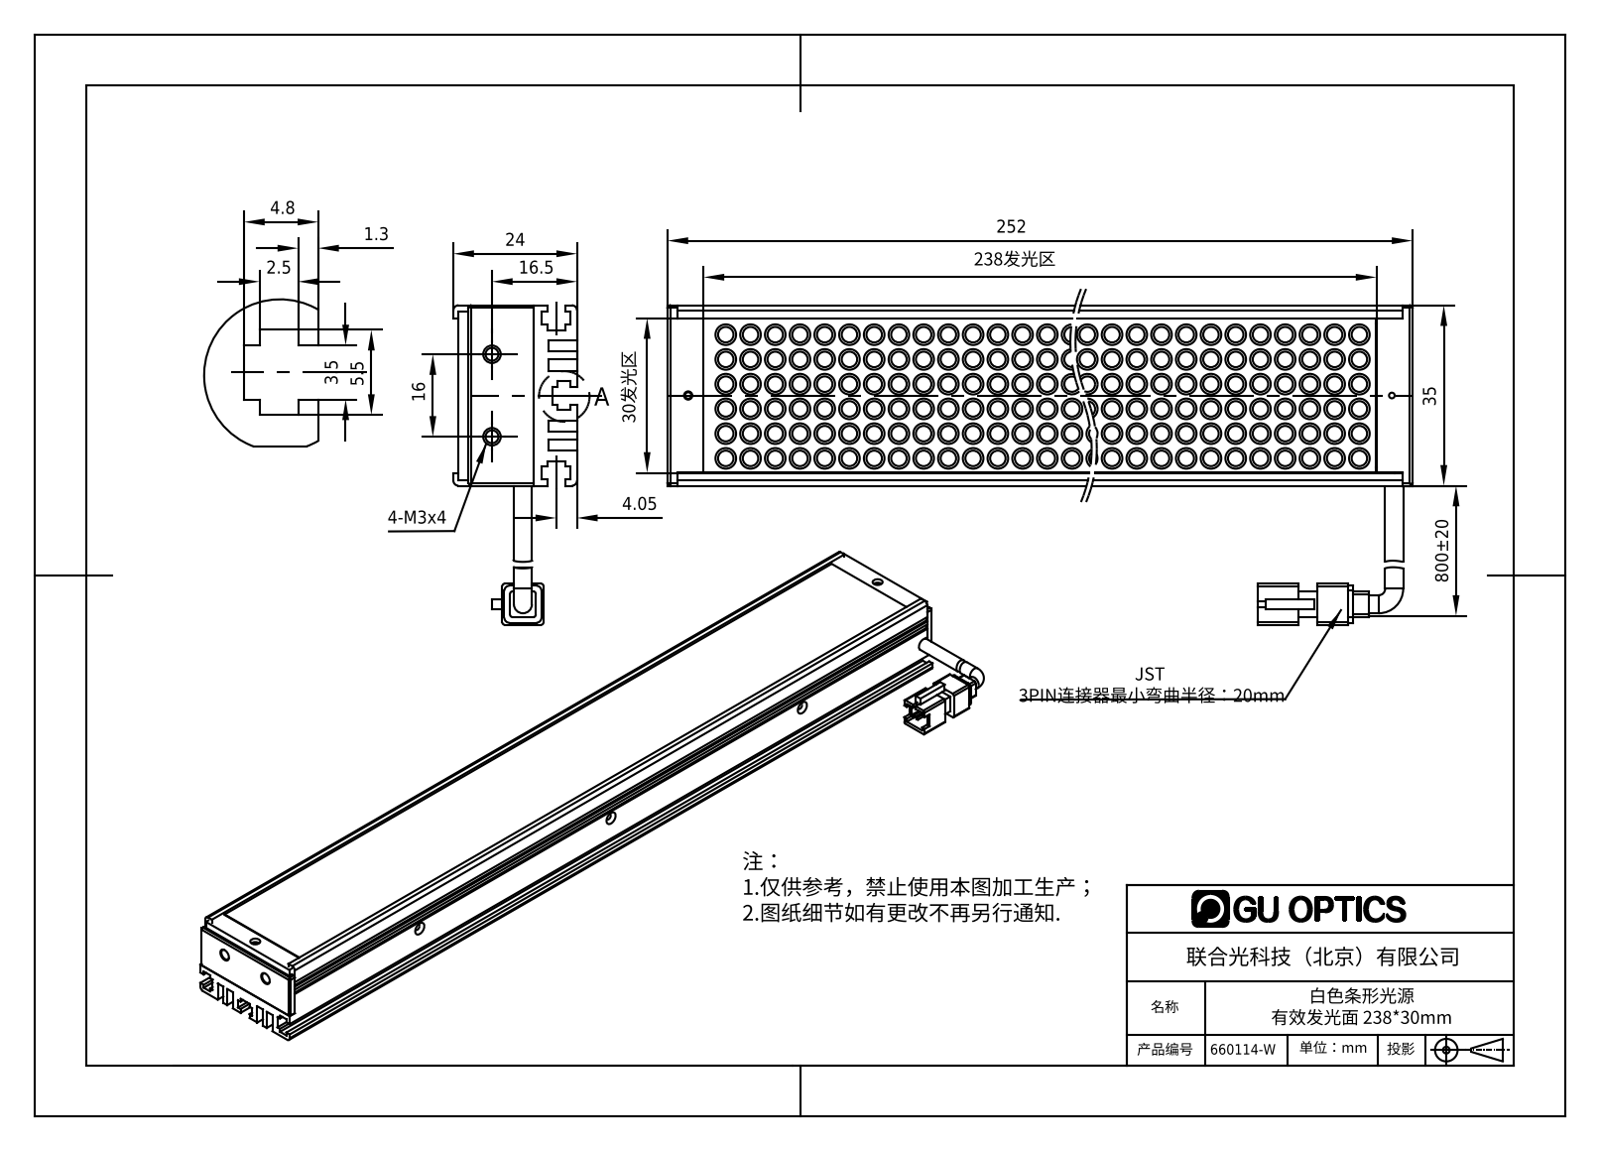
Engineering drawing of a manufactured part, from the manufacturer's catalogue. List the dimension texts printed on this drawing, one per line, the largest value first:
800±20
252
238发光区
35
30发光区
24
16.5
16
5.5
4.8
4.05
3.5
2.5
1.3
